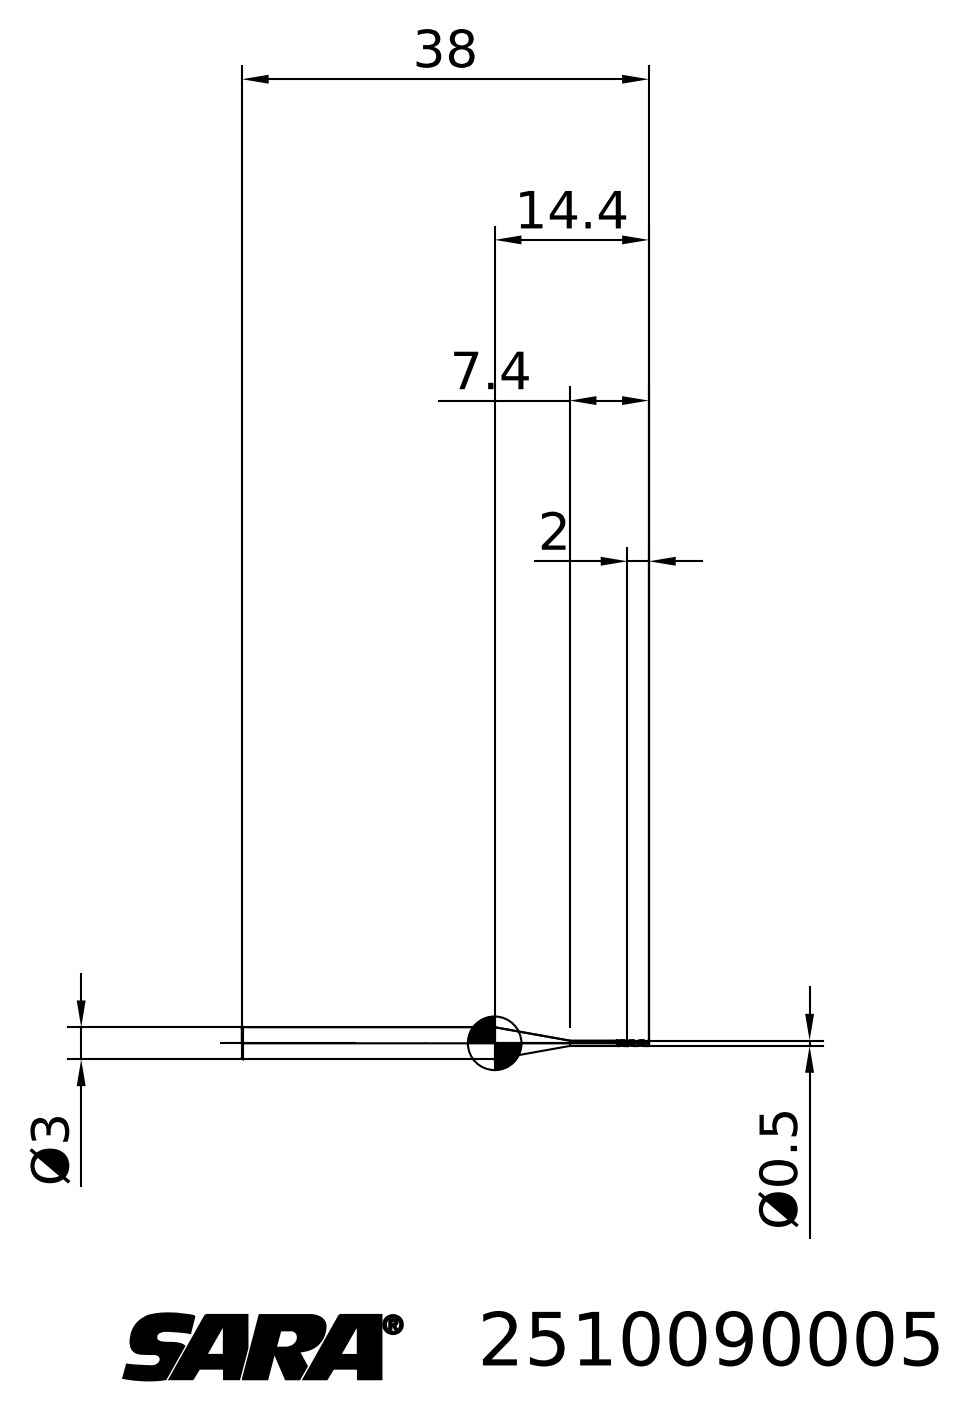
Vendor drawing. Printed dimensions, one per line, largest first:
38
14.4
7.4
Ø3
2
Ø0.5
